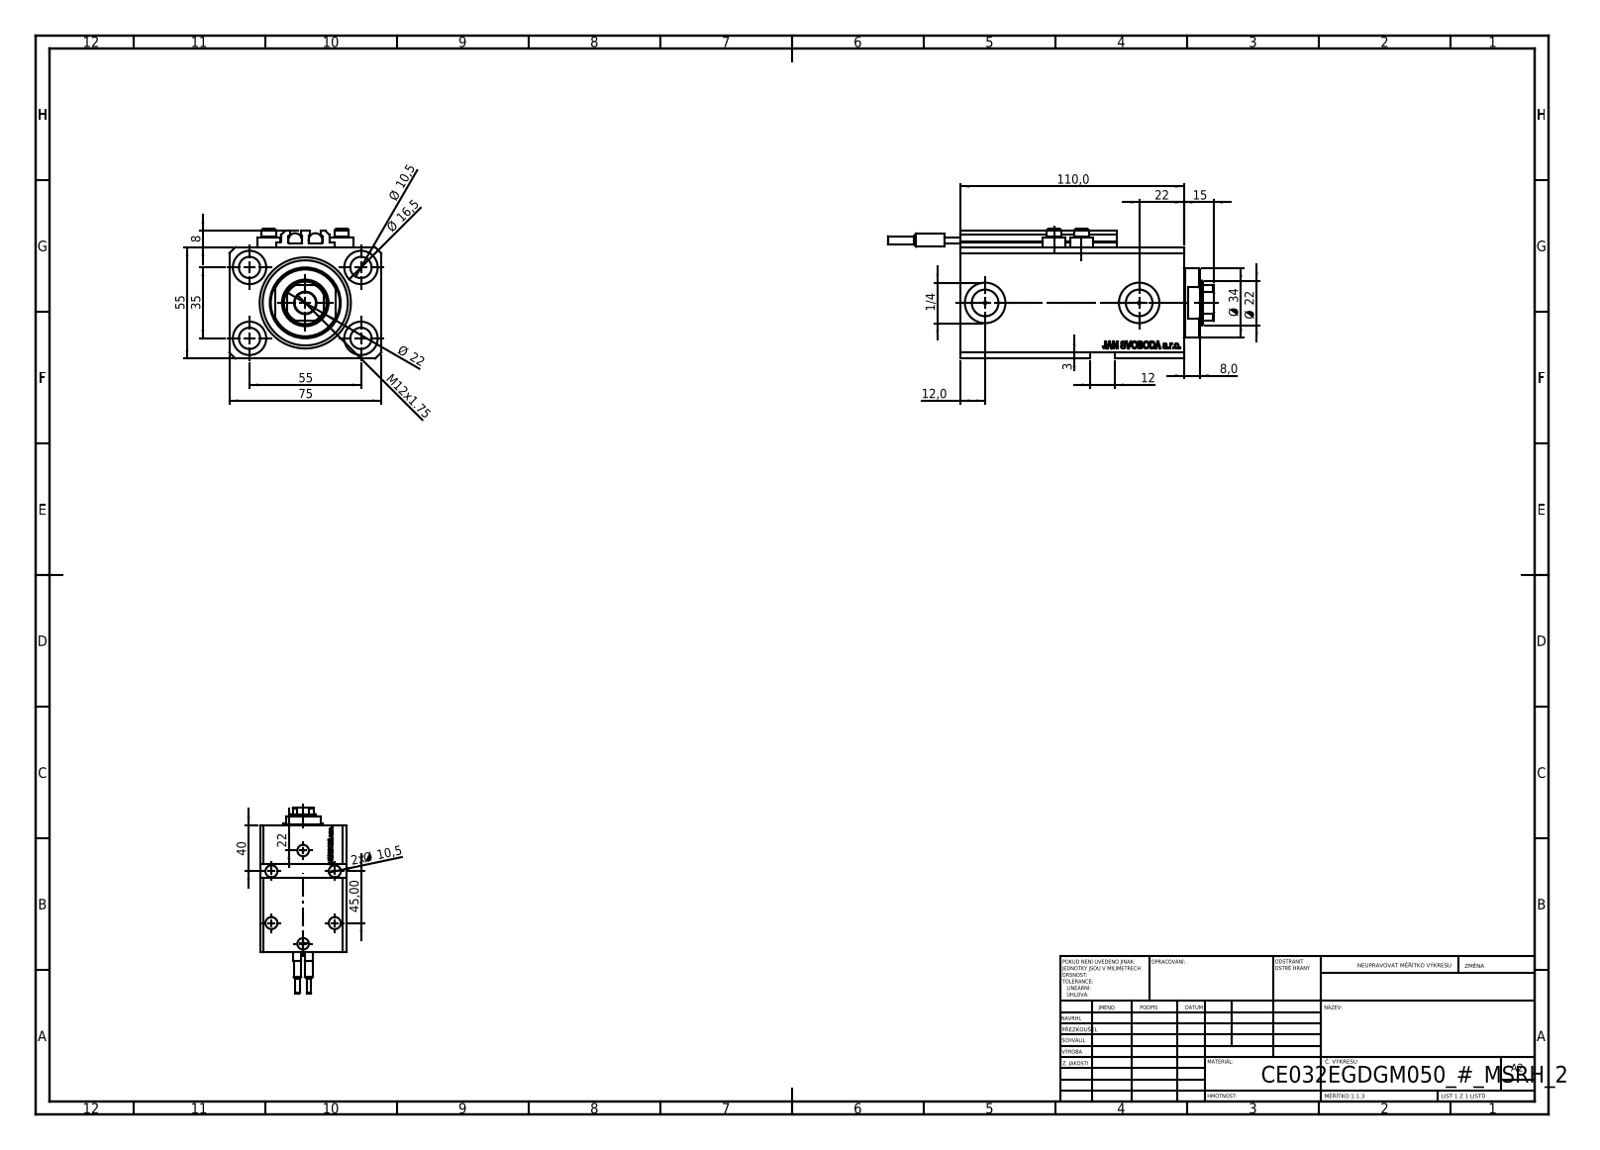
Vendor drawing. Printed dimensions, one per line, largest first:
110,0
75
55
55
45,00
40
35
Ø 34
Ø 22
22
Ø 22
22
Ø 16,5
15
M12x1.75
12,0
12
Ø 10,5
2x Ø 10,5
8
8,0
3
1/4
